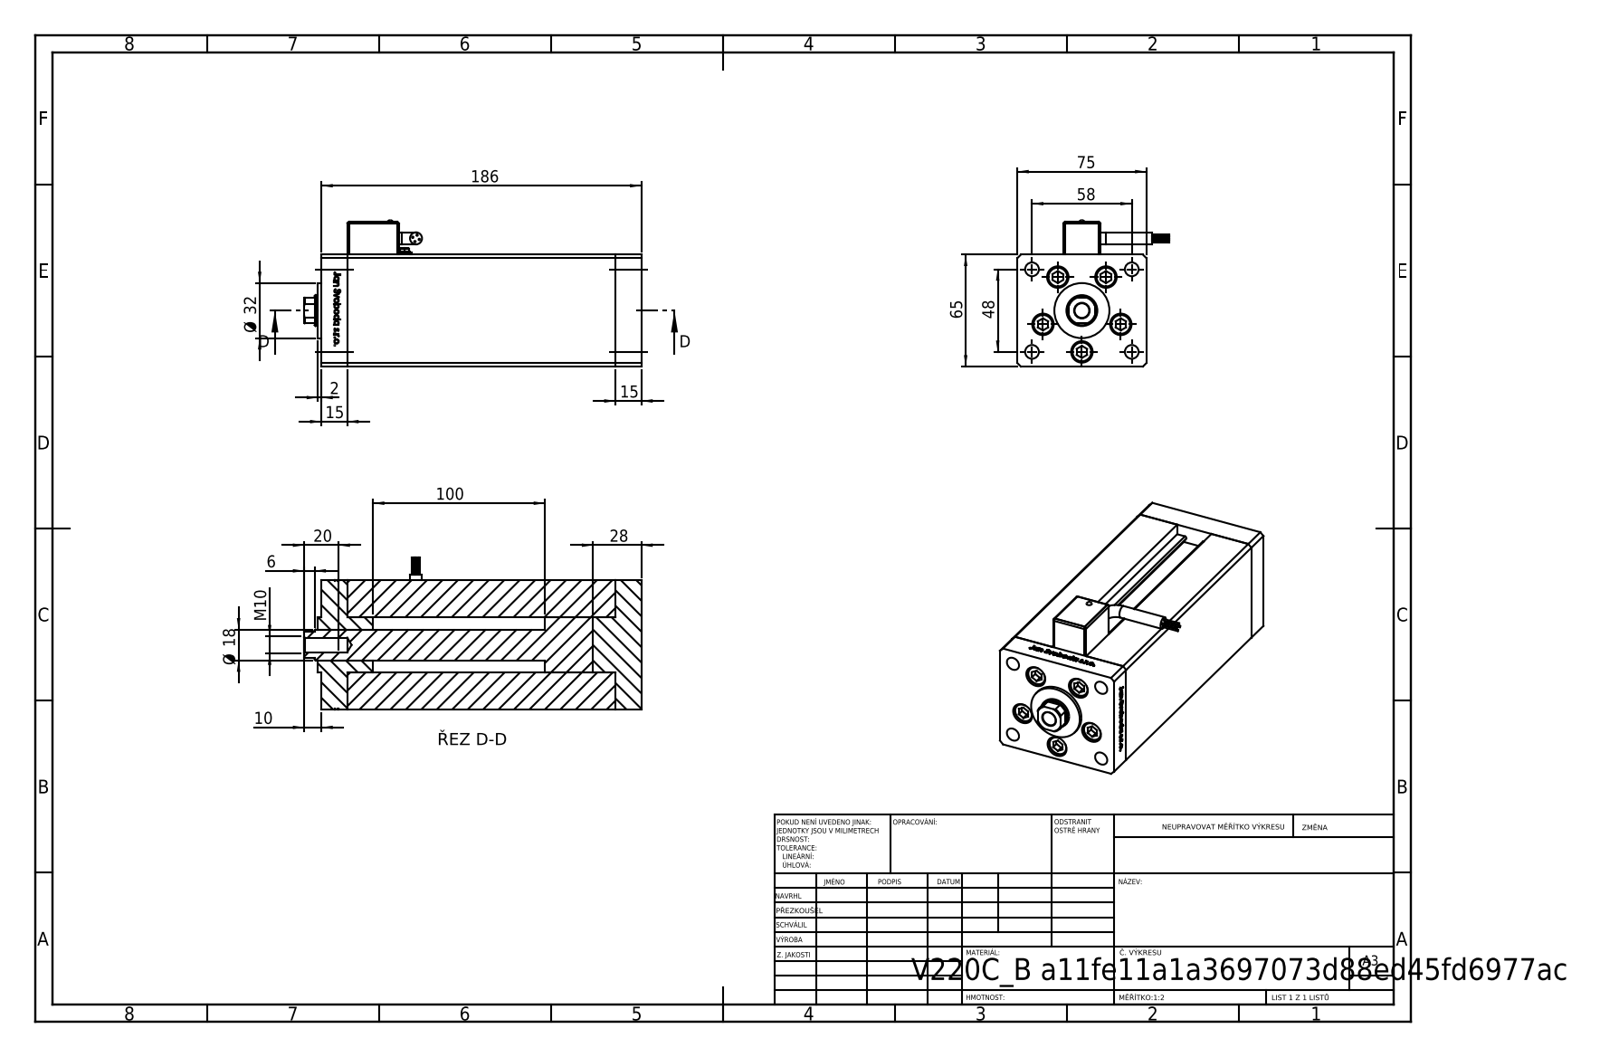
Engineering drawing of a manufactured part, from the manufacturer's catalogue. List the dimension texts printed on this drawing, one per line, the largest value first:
186
100
75
65
58
48
Ø 32
28
20
Ø 18
15
15
M10
10
6
2
